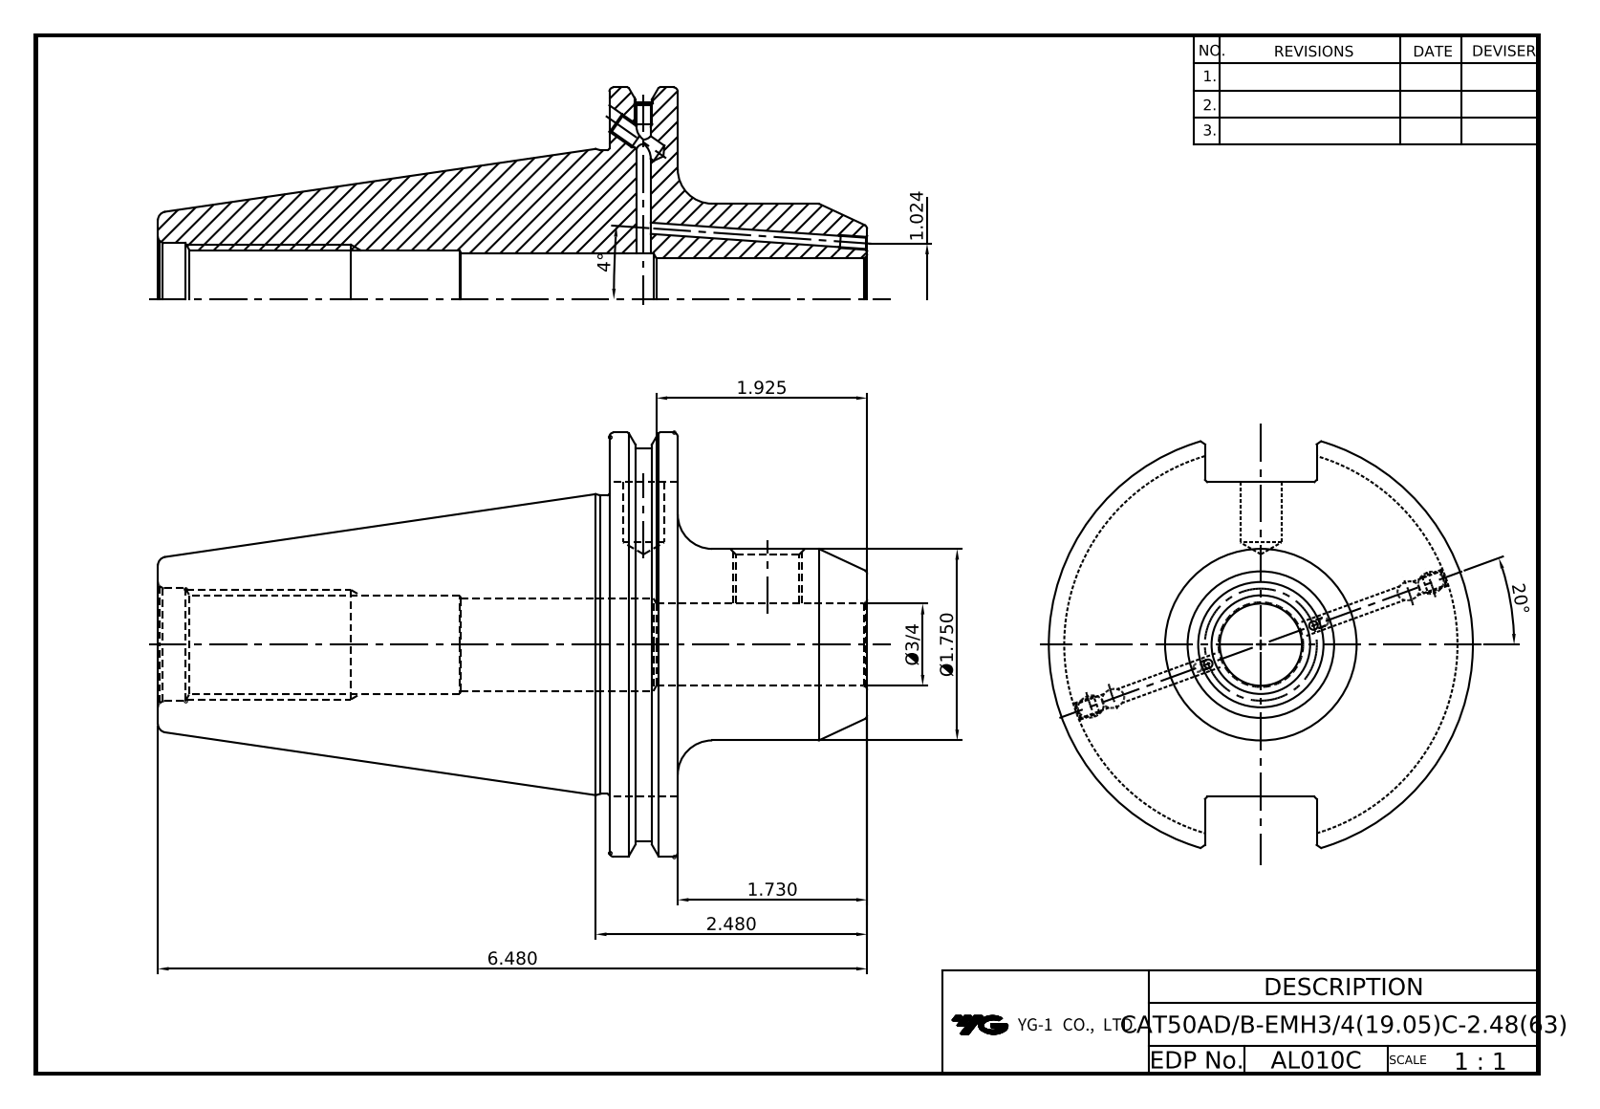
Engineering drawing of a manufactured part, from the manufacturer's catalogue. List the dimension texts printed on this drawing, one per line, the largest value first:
20°
6.480
4°
2.480
1.925
Ø1.750
1.730
Ø3/4
